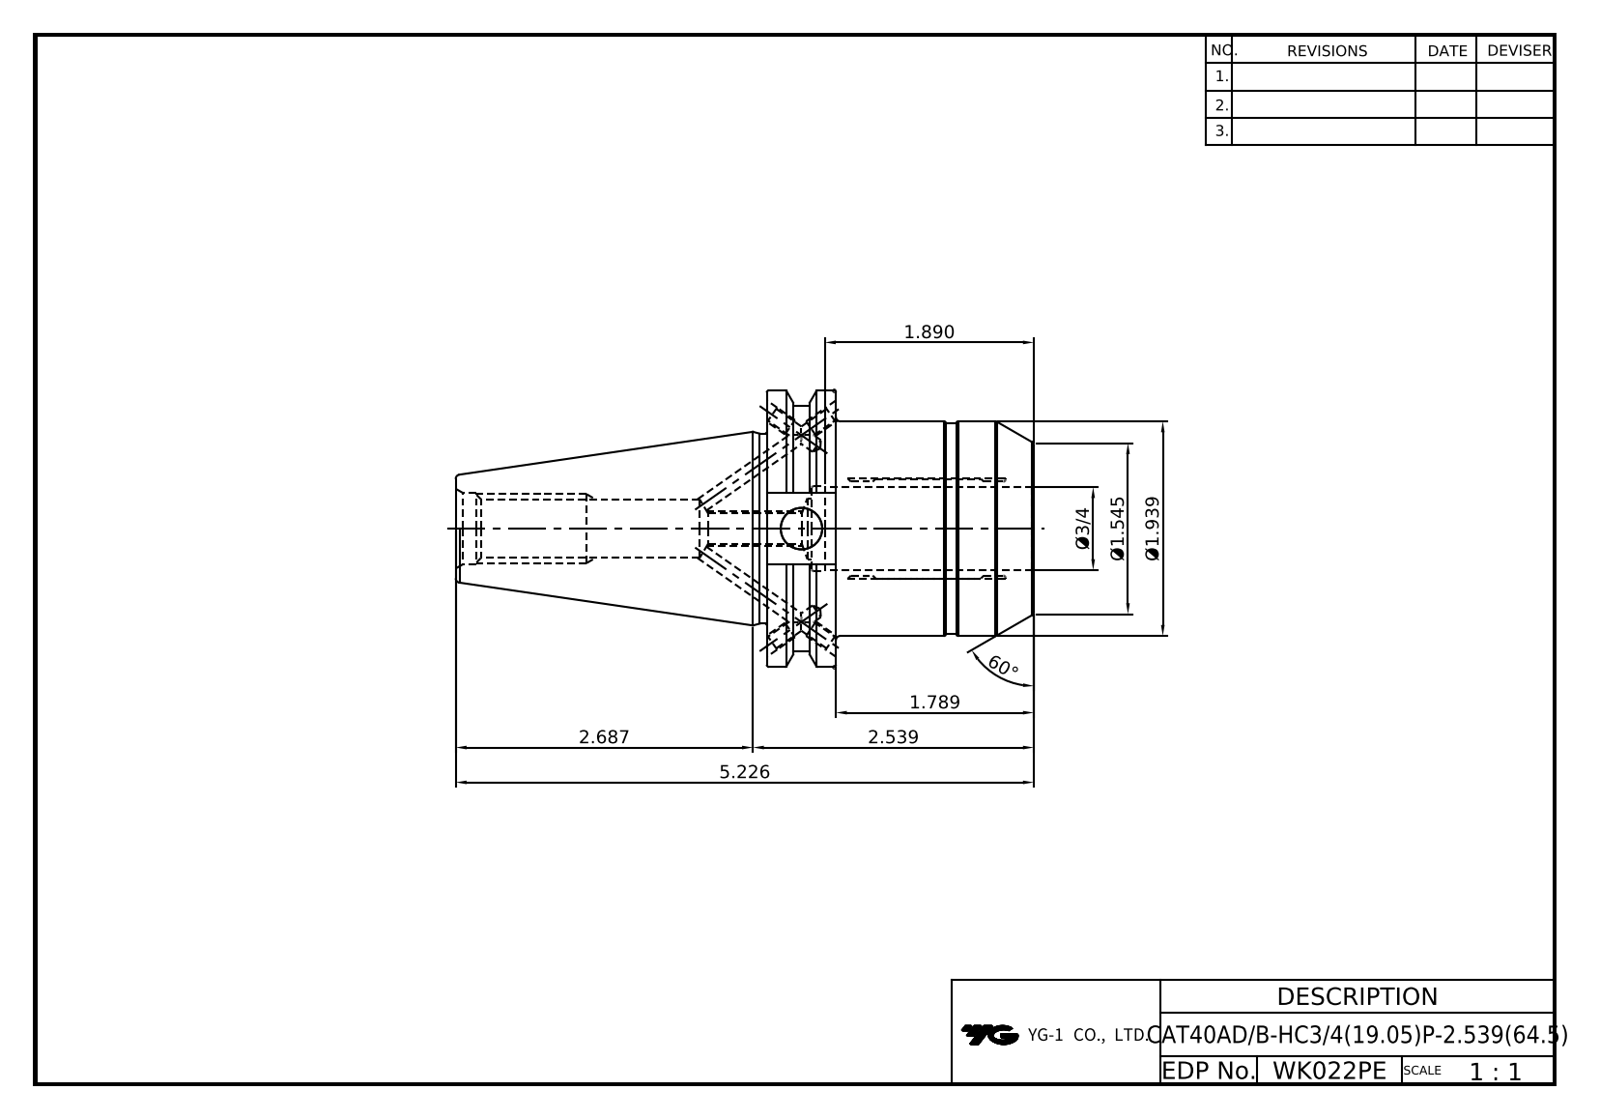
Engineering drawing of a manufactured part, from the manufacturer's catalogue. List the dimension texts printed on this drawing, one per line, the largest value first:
60°
5.226
2.687
2.539
Ø1.939
1.890
1.789
Ø1.545
Ø3/4
